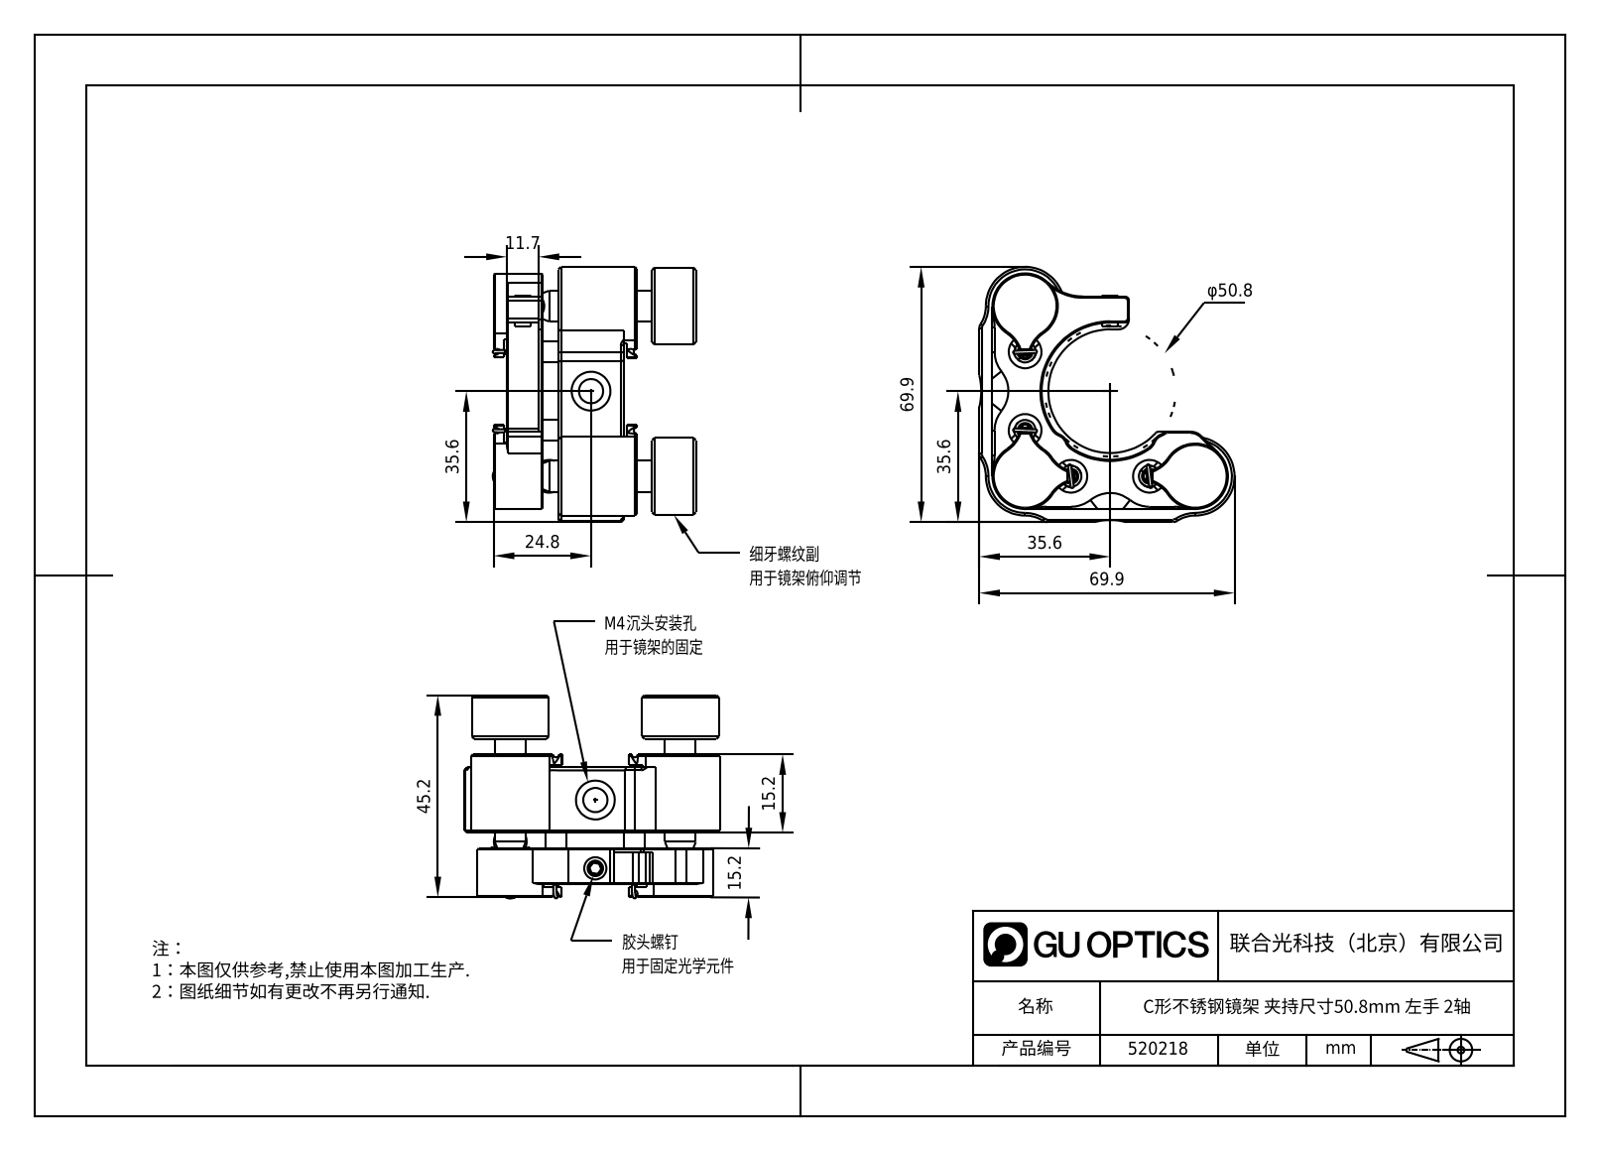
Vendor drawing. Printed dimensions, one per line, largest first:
69.9
69.9
45.2
35.6
35.6
35.6
24.8
15.2
15.2
11.7
